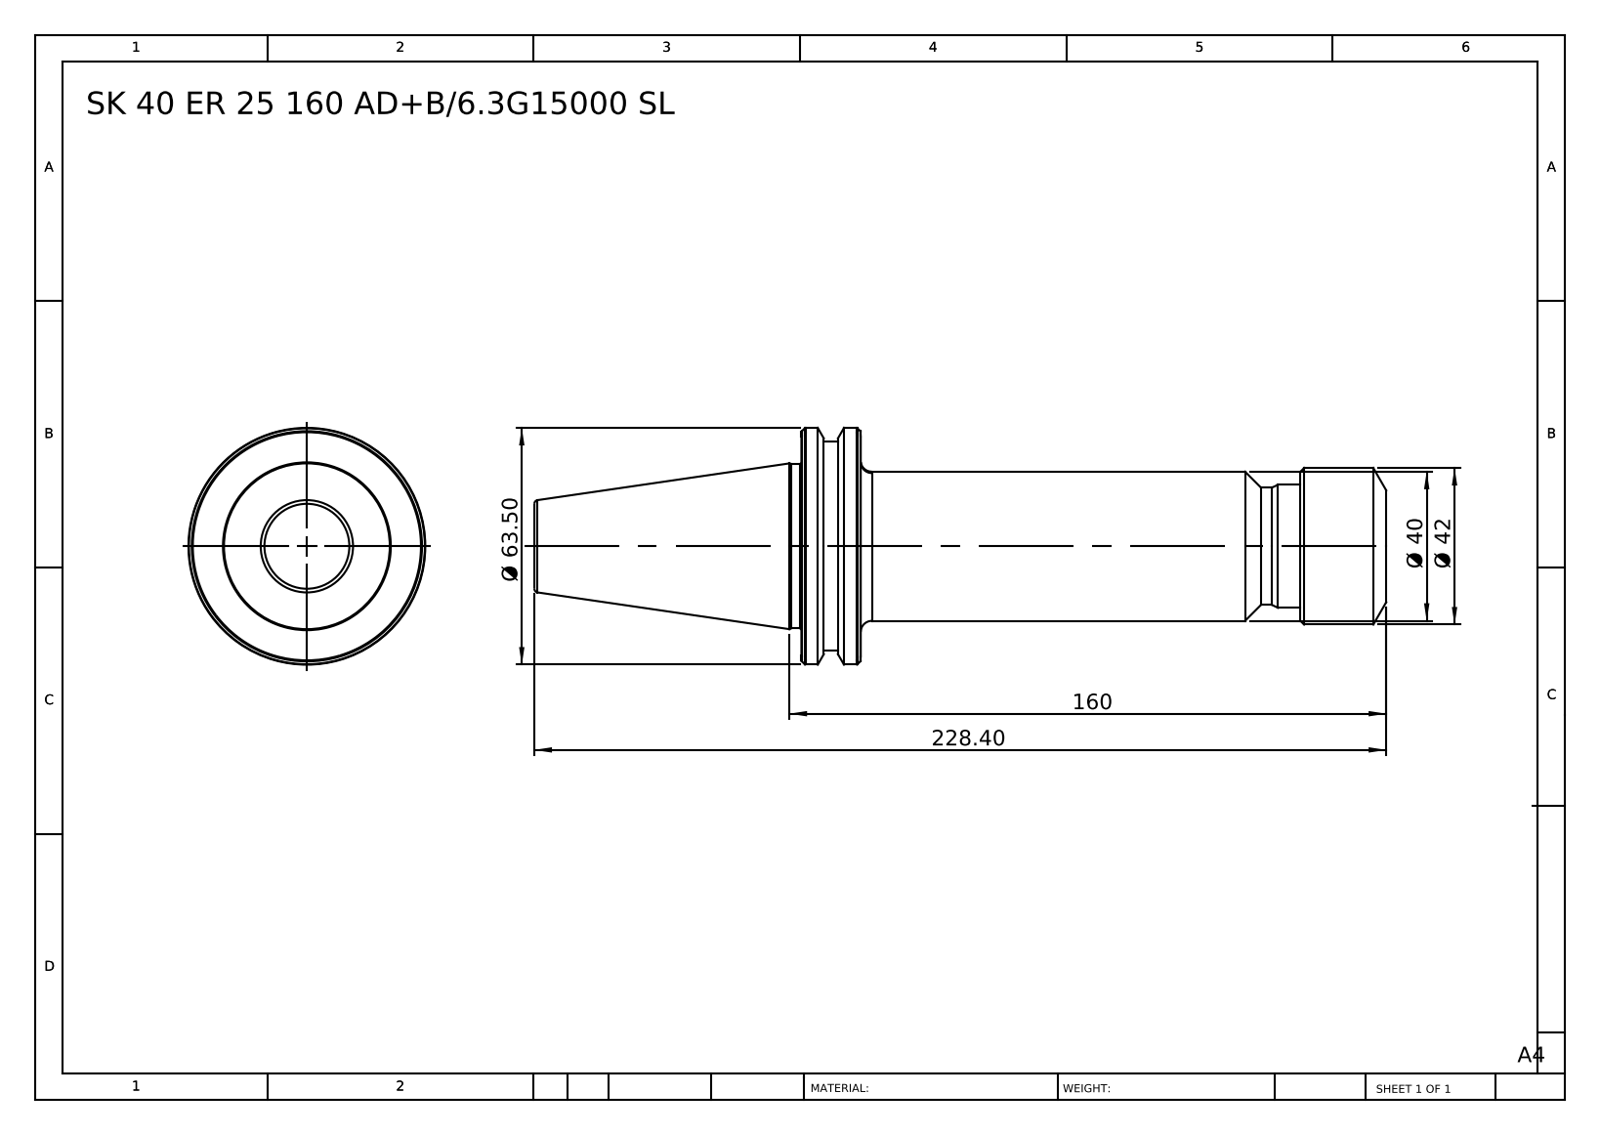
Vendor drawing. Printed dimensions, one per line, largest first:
228.40
160
Ø 63.50
Ø 42
Ø 40
